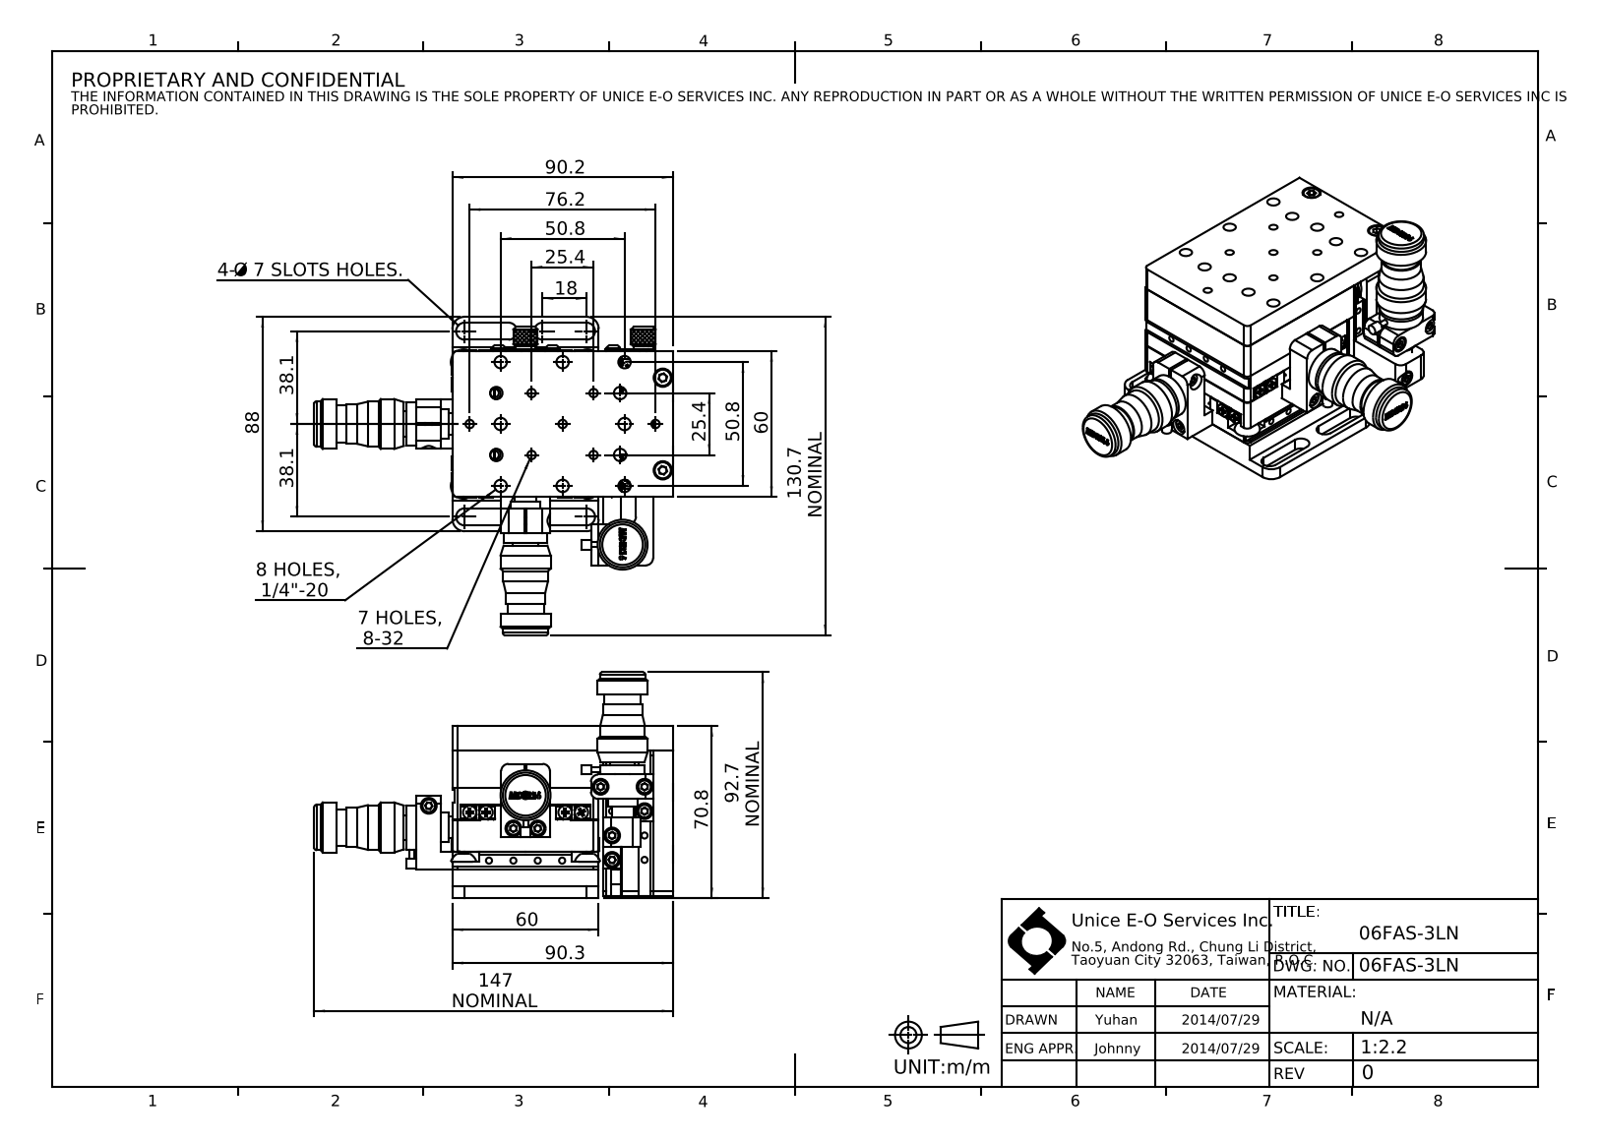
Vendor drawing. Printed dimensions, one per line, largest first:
147 NOMINAL
130.7 NOMINAL
92.7 NOMINAL
90.3
90.2
88
76.2
70.8
60
60
50.8
50.8
38.1
38.1
25.4
25.4
18
8 HOLES, 1/4"-20
7 HOLES, 8-32
4- Ø 7 SLOTS HOLES.
